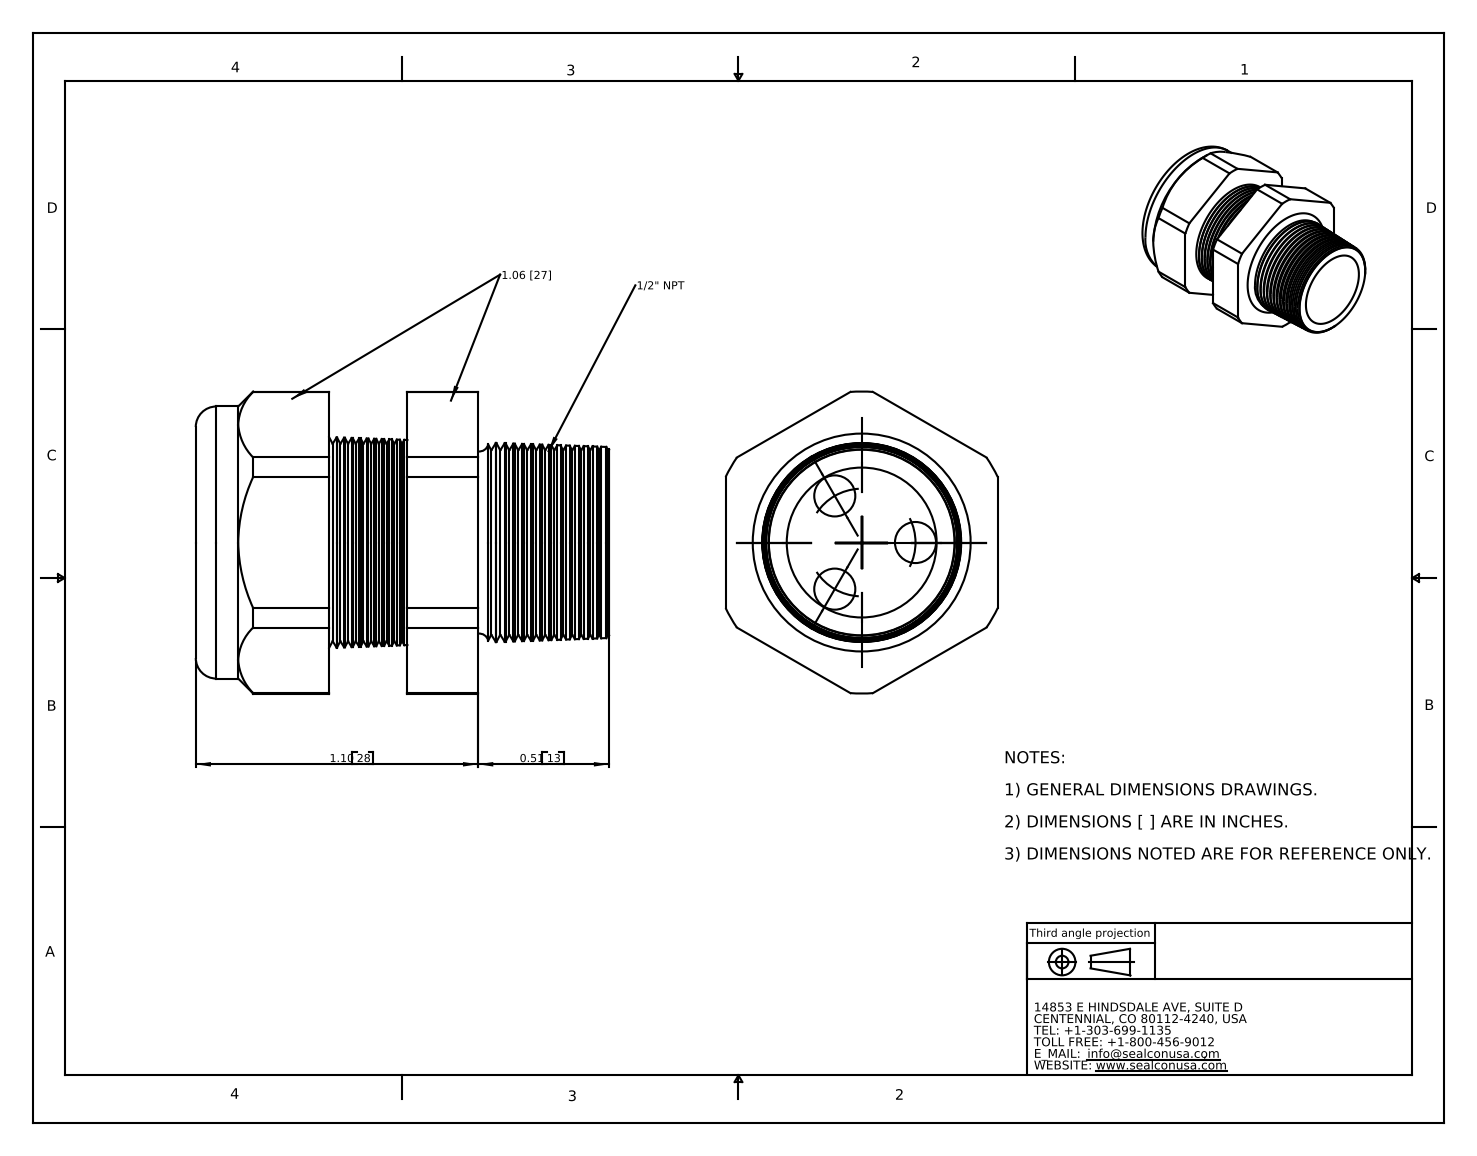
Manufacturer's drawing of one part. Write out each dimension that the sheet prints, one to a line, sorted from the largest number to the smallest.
1.10 28
0.51 13
